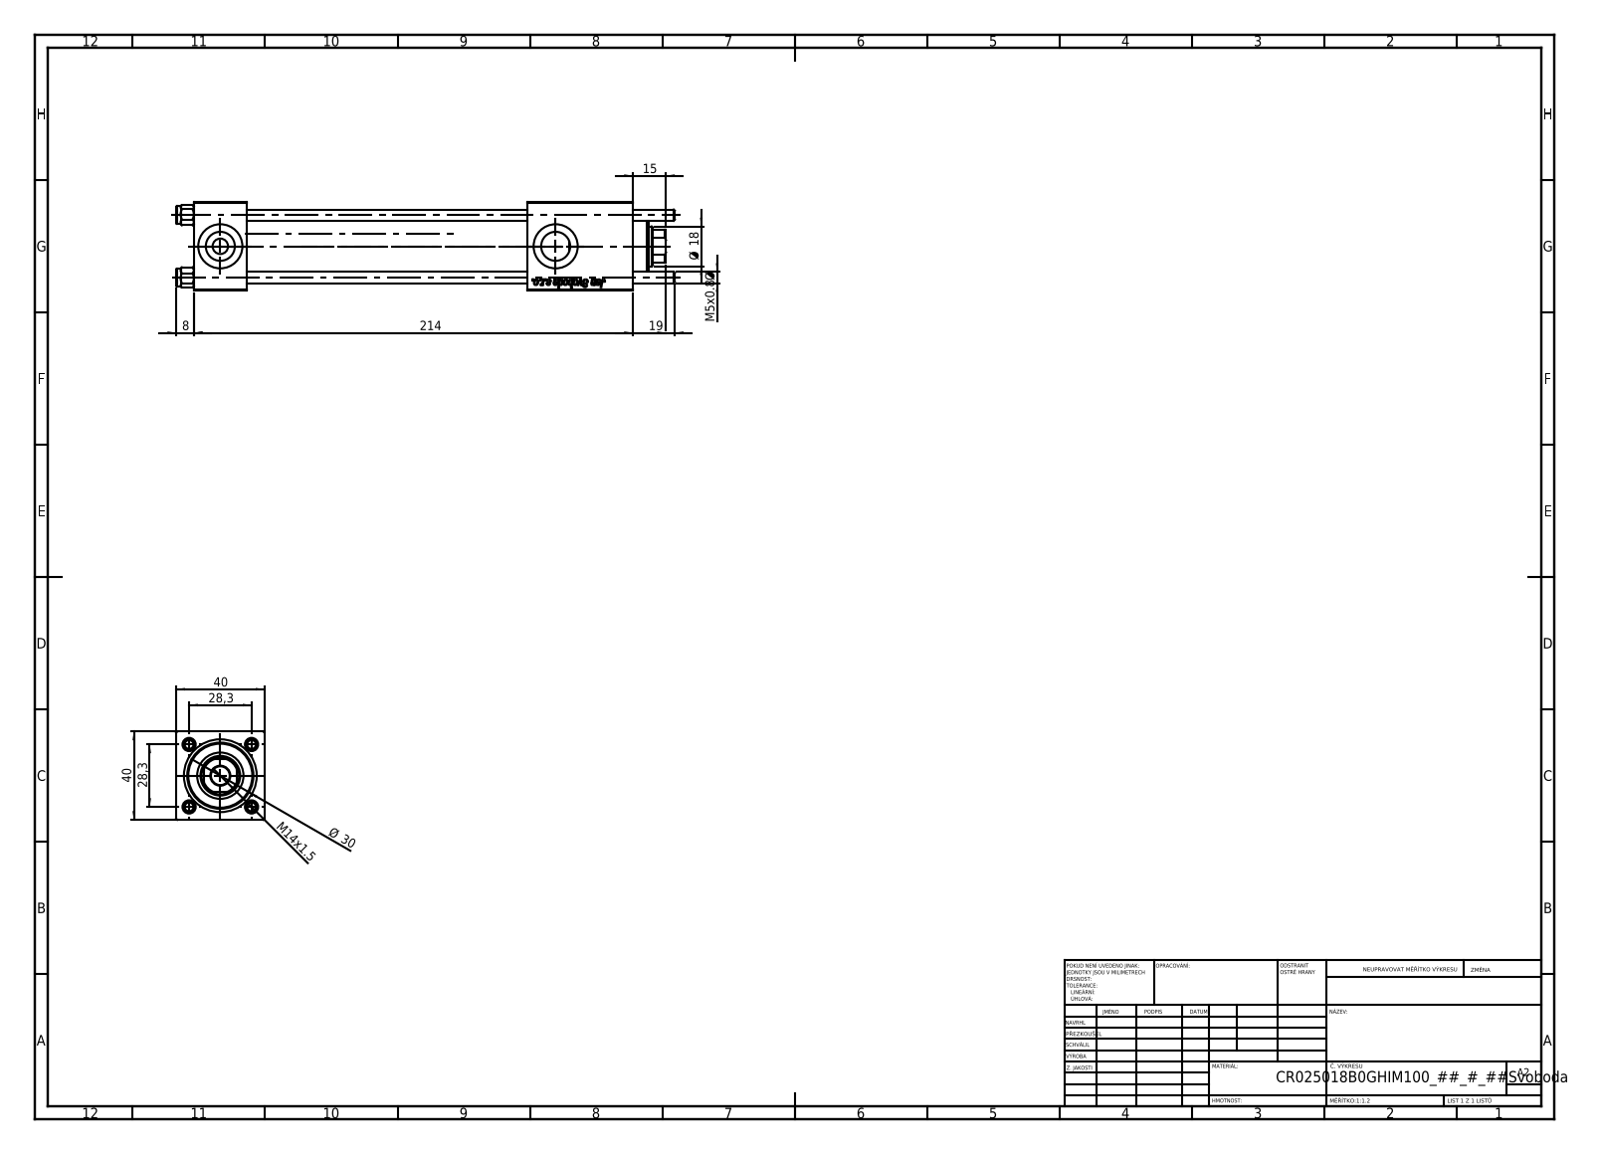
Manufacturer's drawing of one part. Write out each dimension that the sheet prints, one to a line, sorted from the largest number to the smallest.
214
40
40
Ø 30
28,3
28,3
19
Ø 18
15
M14x1.5
8
M5x0.8 Ø
